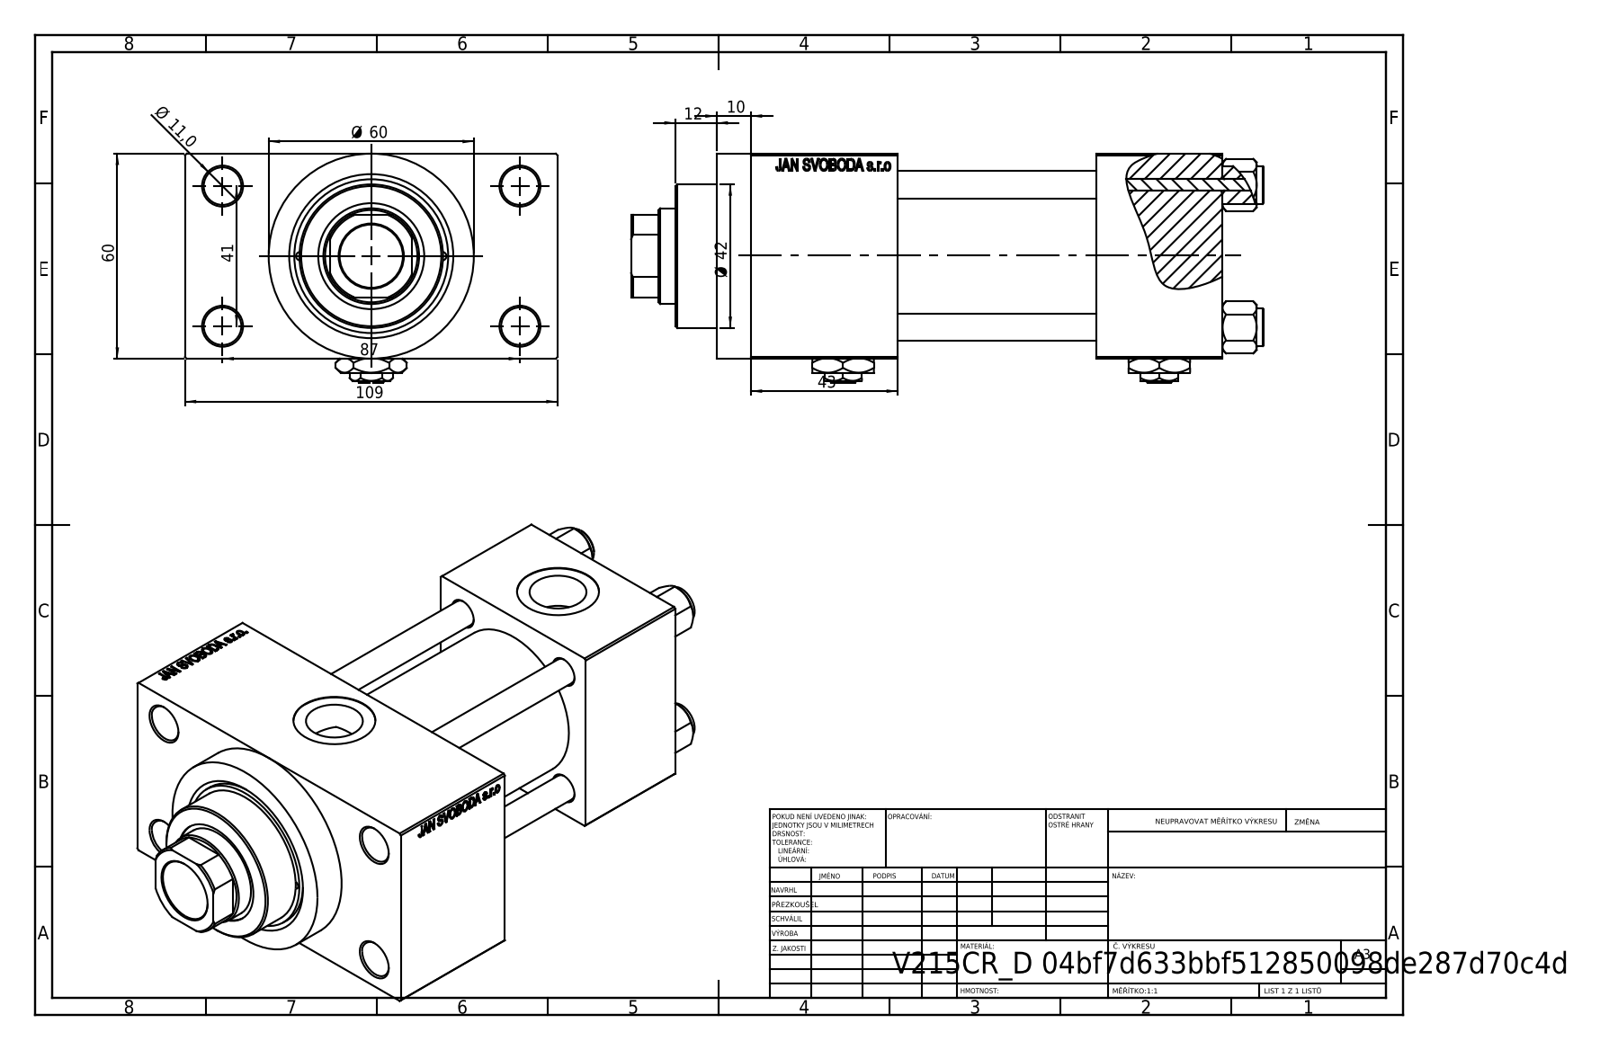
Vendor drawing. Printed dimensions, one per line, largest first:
109
87
60
Ø 60
43
Ø 42
41
12
Ø 11,0
10
